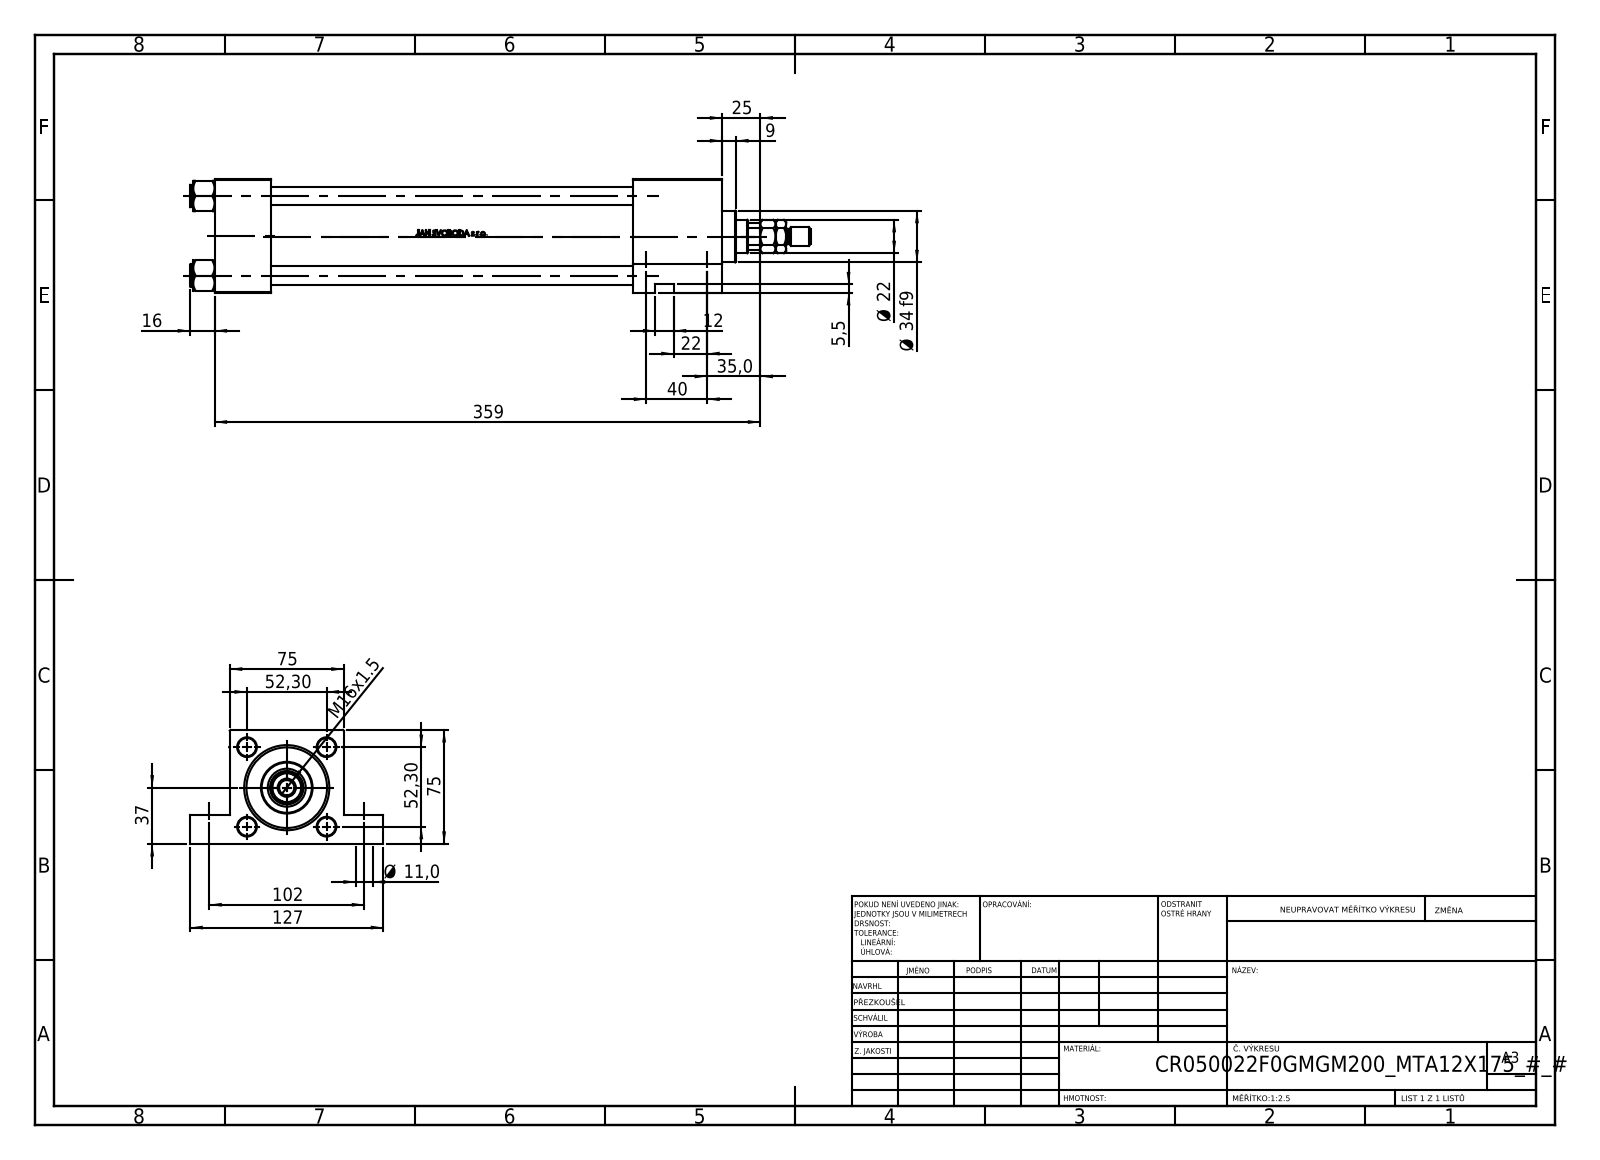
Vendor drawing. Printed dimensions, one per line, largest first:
359
127
102
75
75
52,30
52,30
40
37
35,0
Ø 34 f9
25
Ø 22
22
16
M16x1.5
12
Ø 11,0
9
5,5
